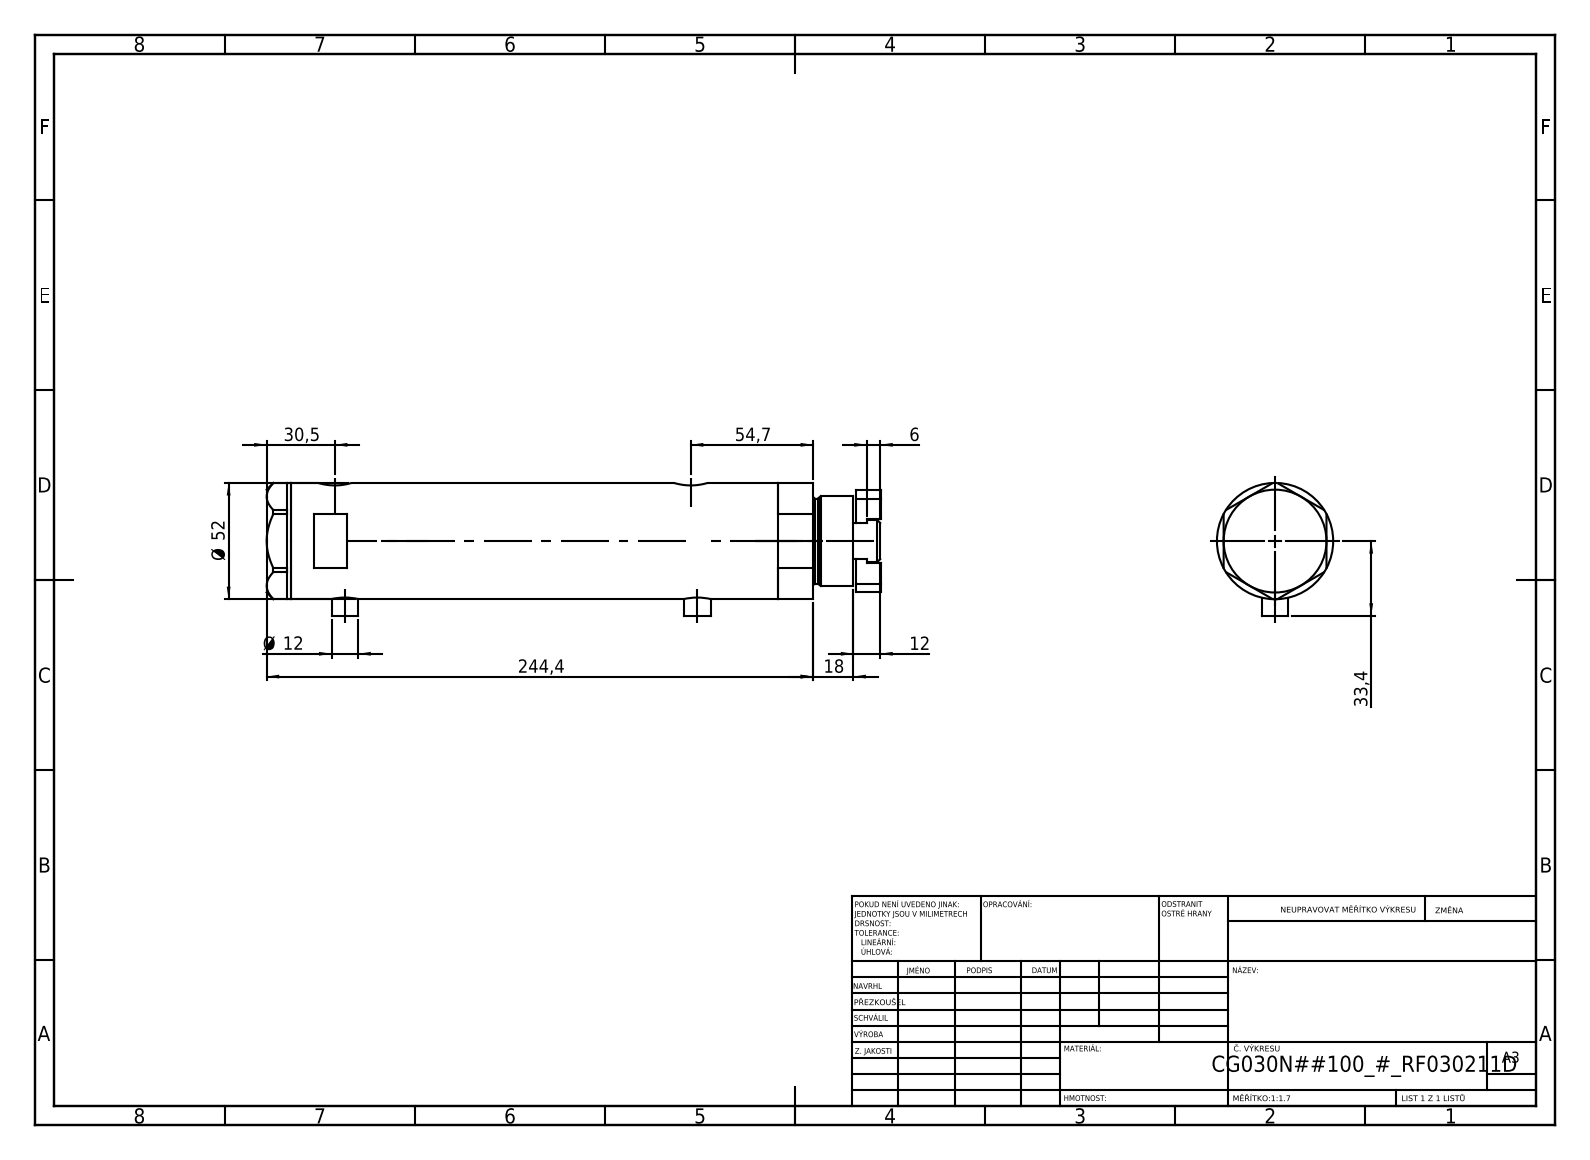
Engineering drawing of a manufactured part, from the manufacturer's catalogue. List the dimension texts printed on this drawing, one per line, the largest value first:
244,4
54,7
Ø 52
33,4
30,5
18
12
Ø 12
6
